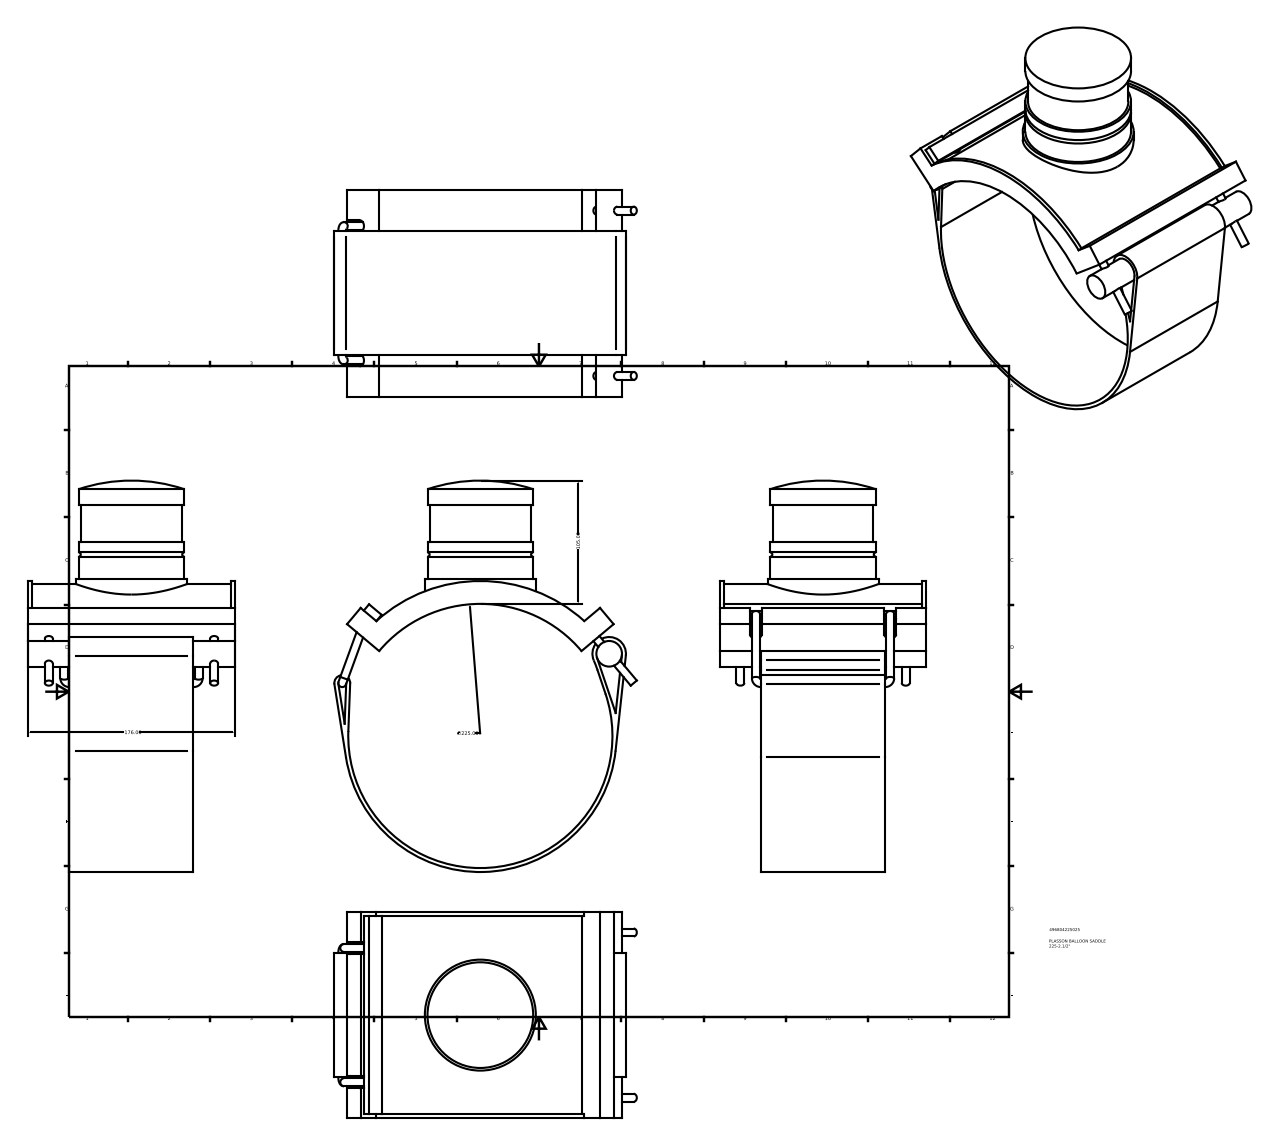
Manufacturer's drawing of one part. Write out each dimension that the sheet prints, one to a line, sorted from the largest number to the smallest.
∅225.00
176.00
105.00
